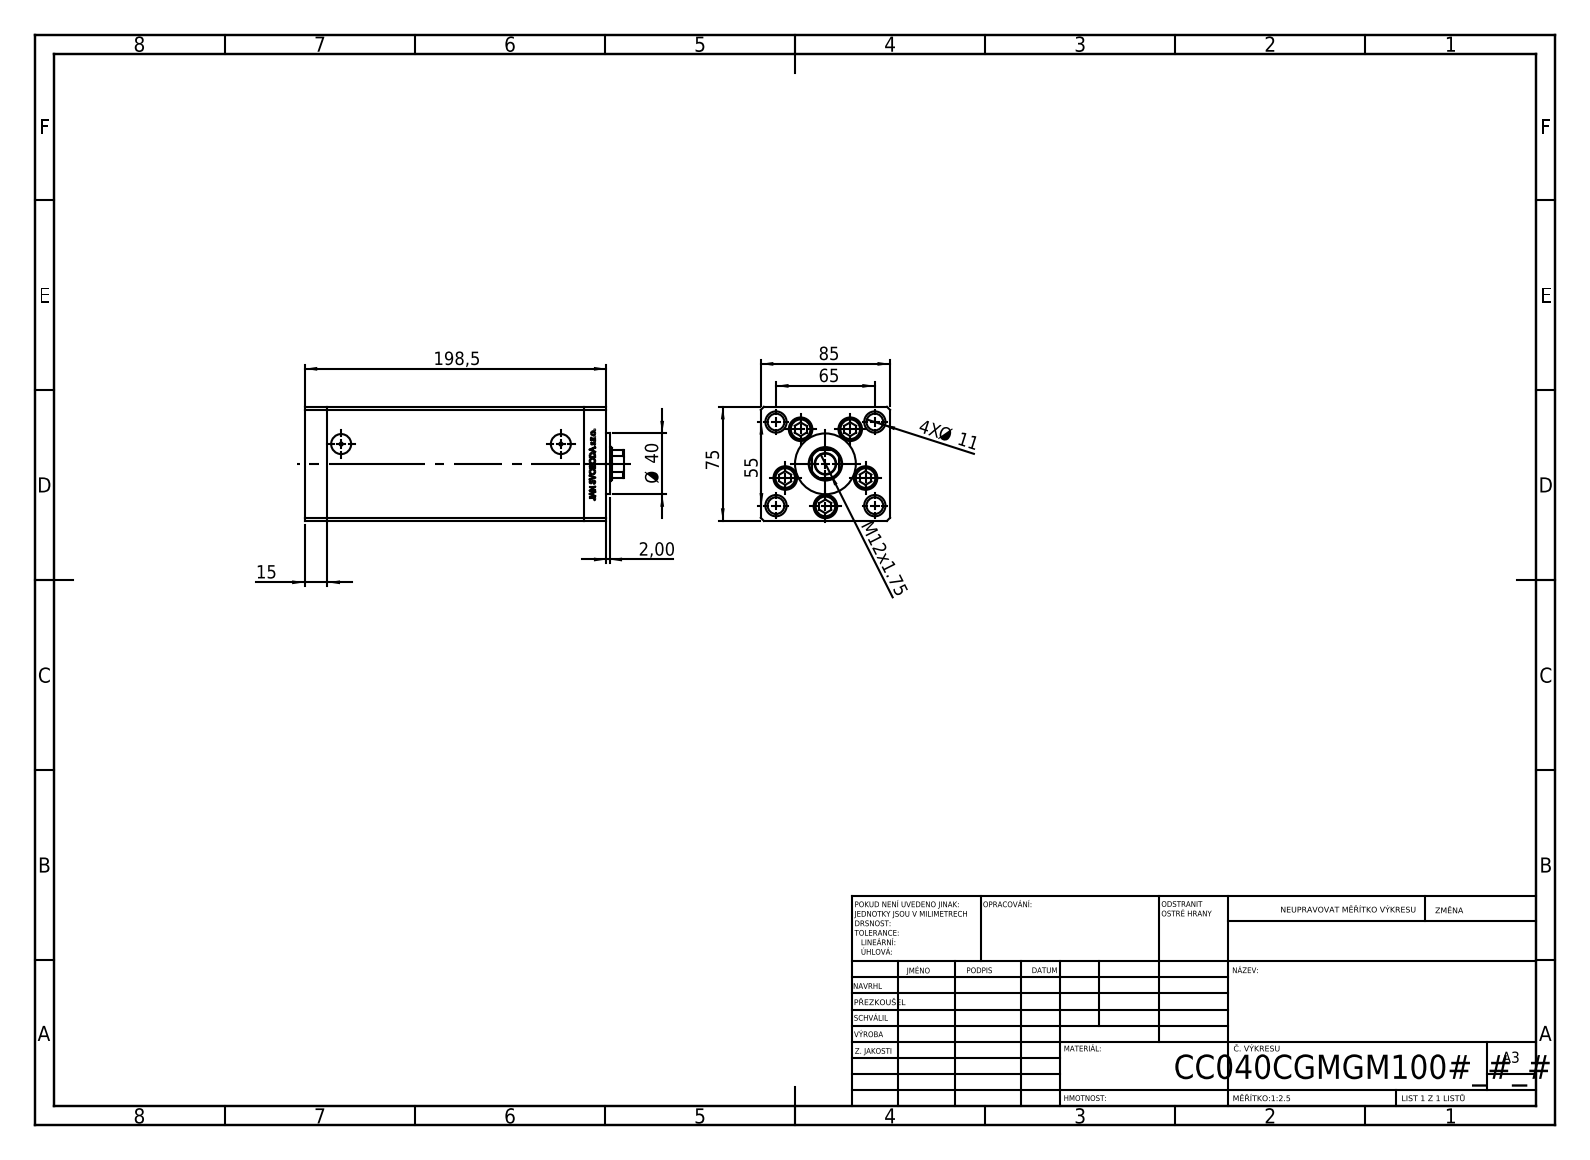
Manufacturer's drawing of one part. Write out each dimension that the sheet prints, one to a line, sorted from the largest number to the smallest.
198,5
85
75
65
55
Ø 40
15
M12x1.75
4X Ø 11
2,00
